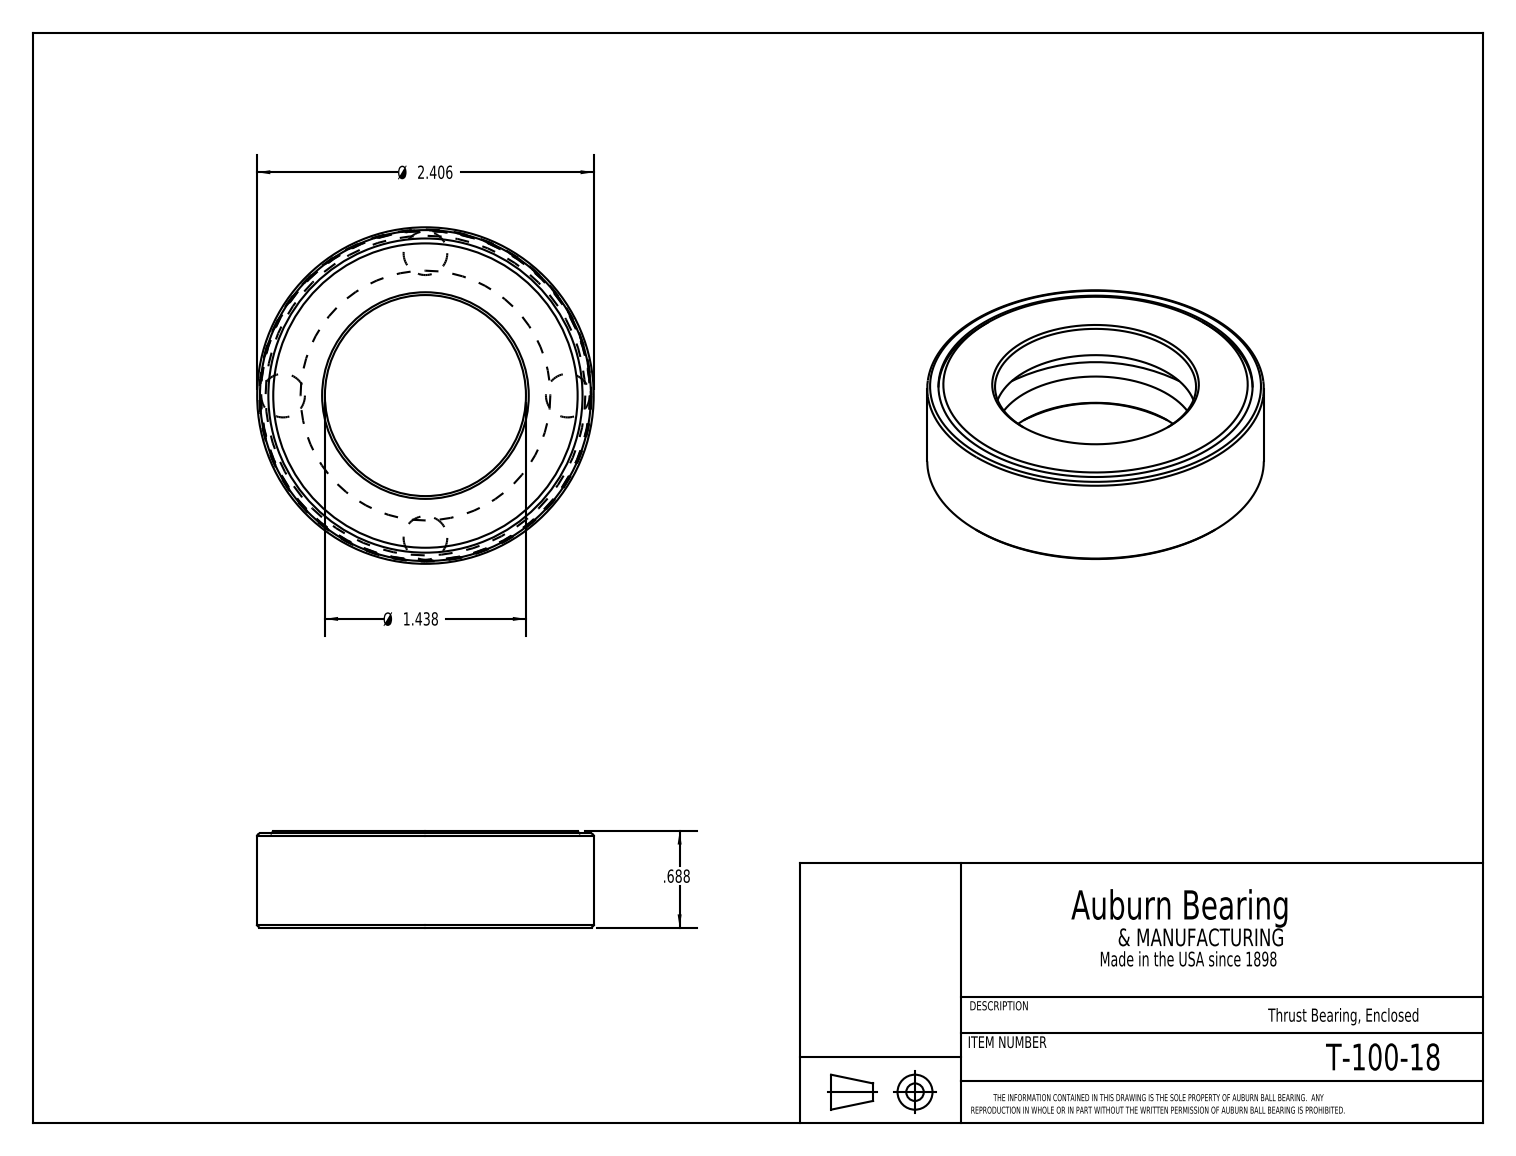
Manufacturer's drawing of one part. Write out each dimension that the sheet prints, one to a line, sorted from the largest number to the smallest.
Ø 2.406
Ø 1.438
.688
